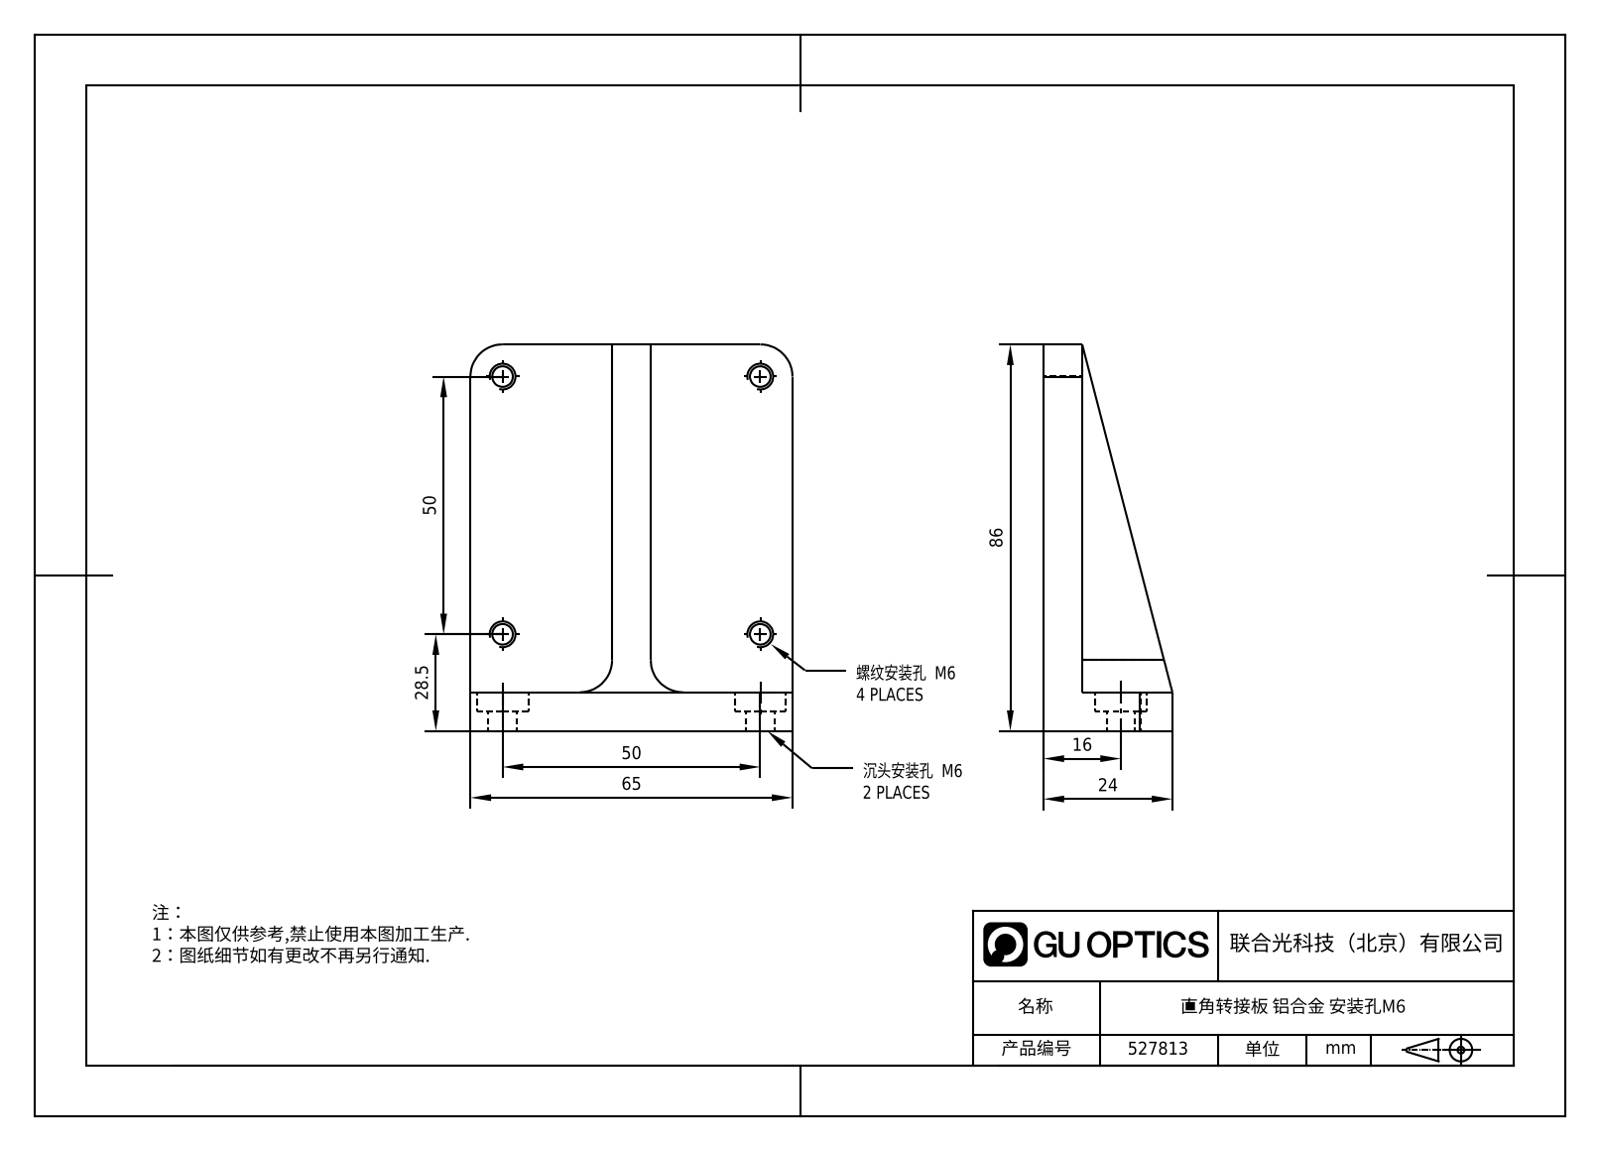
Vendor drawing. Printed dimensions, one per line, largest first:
86
65
50
50
28.5
24
16
